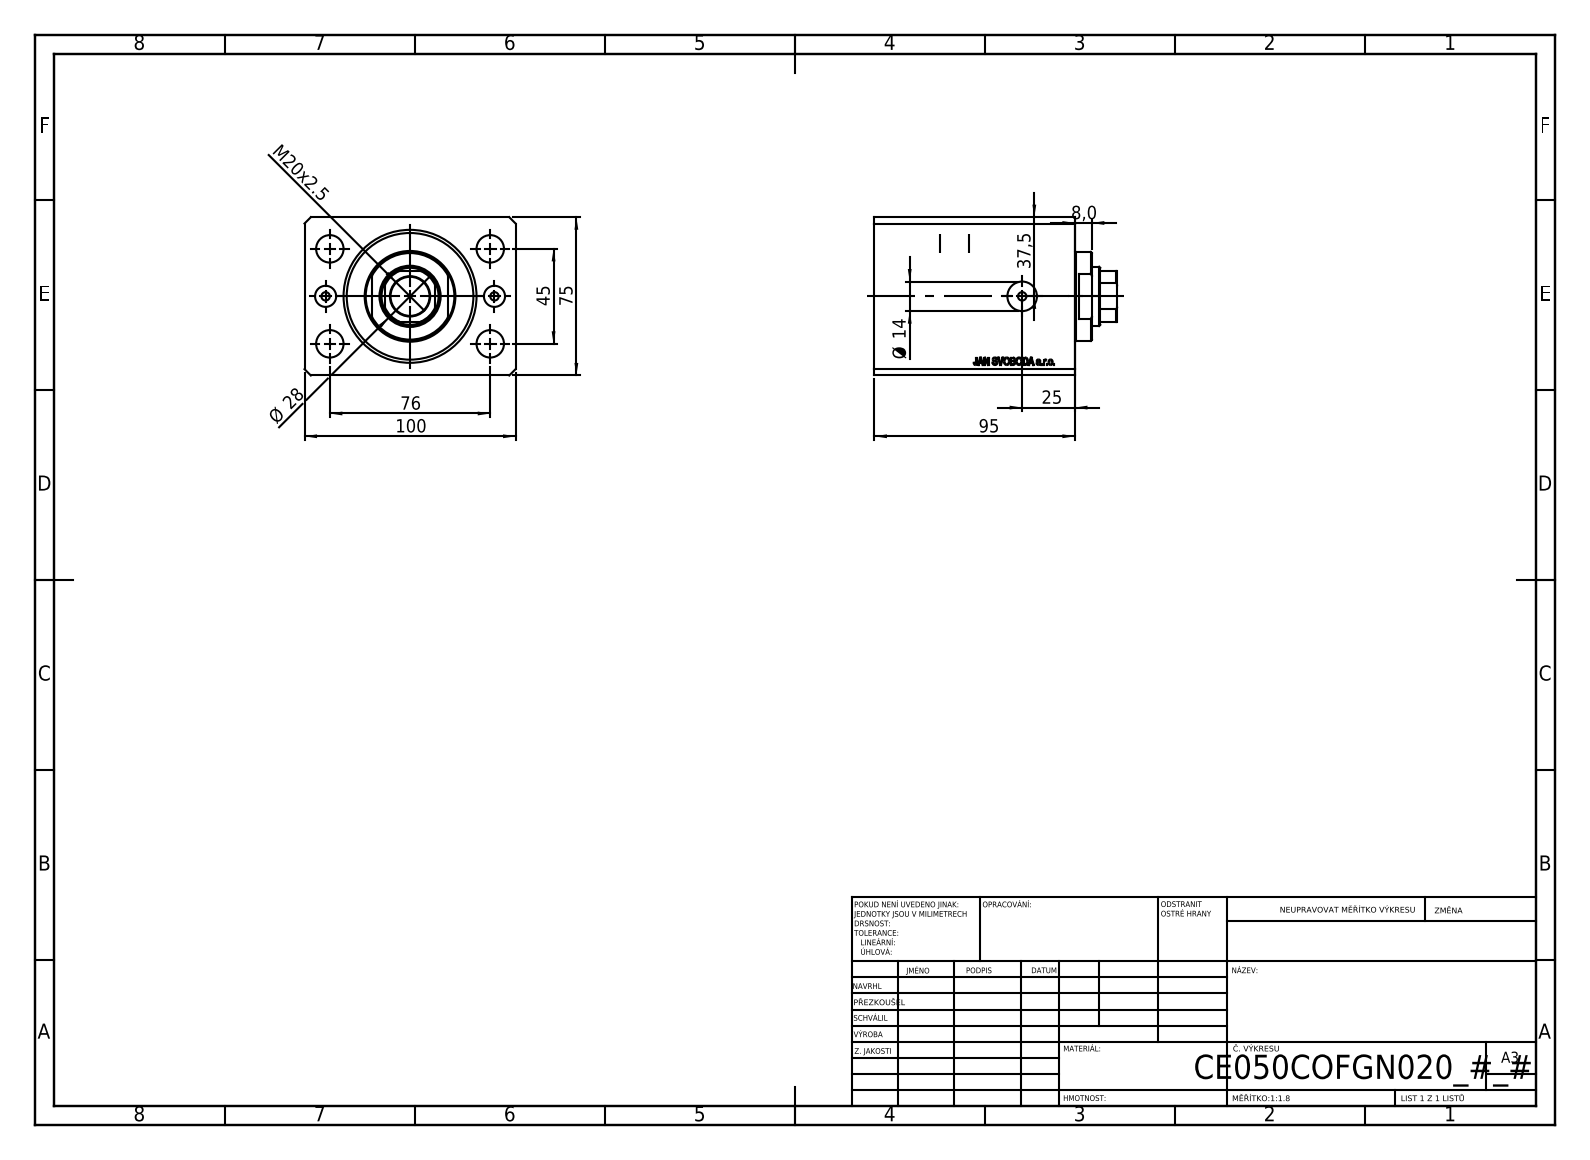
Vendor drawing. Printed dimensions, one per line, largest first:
100
95
76
75
45
37,5
Ø 28
25
M20x2.5
Ø 14
8,0
